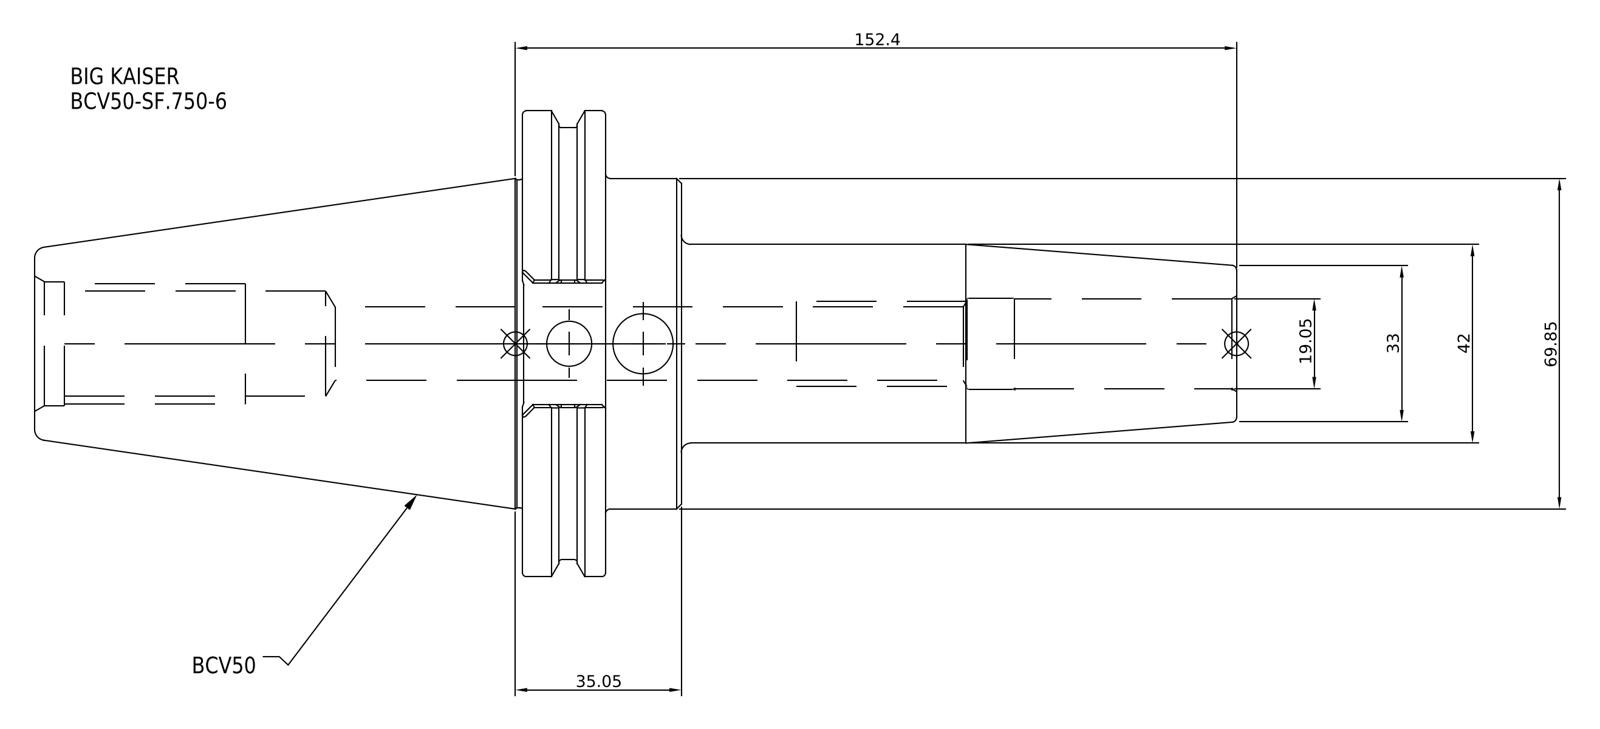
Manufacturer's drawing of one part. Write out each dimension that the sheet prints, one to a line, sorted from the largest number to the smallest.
152.4
69.85
42
35.05
33
19.05
